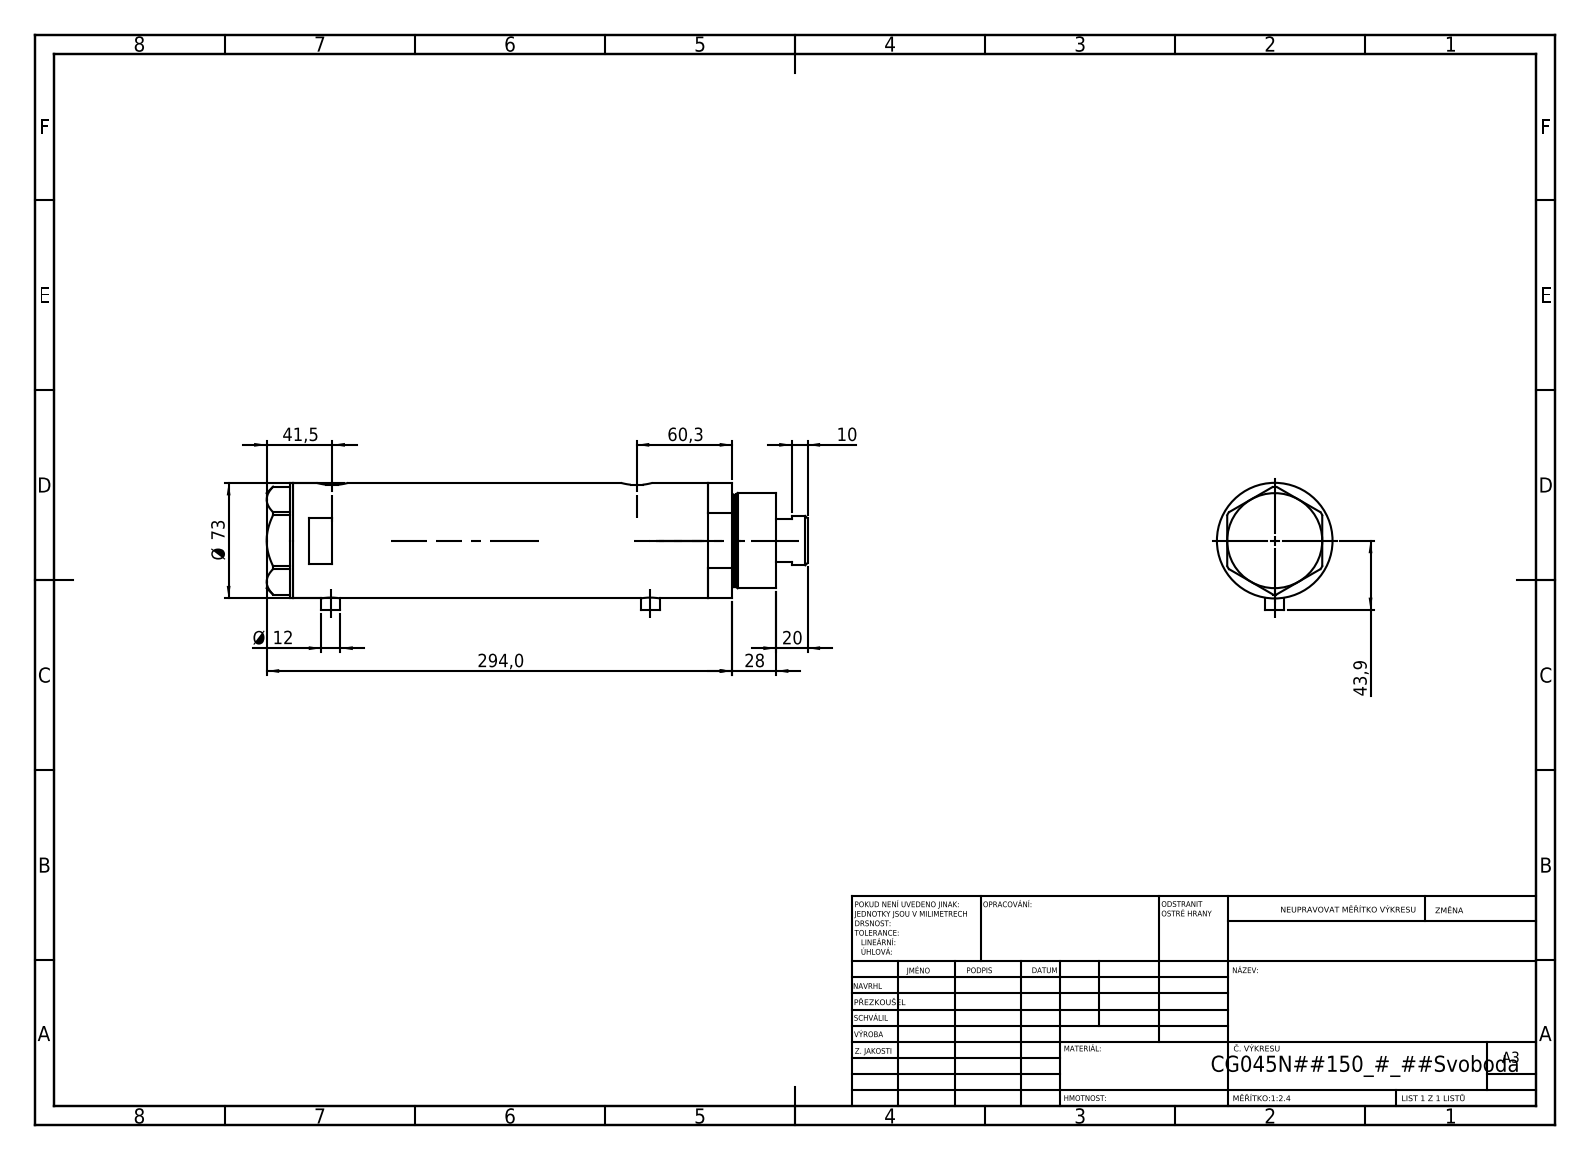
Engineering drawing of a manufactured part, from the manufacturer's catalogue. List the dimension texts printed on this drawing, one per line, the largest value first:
294,0
Ø 73
60,3
43,9
41,5
28
20
Ø 12
10
